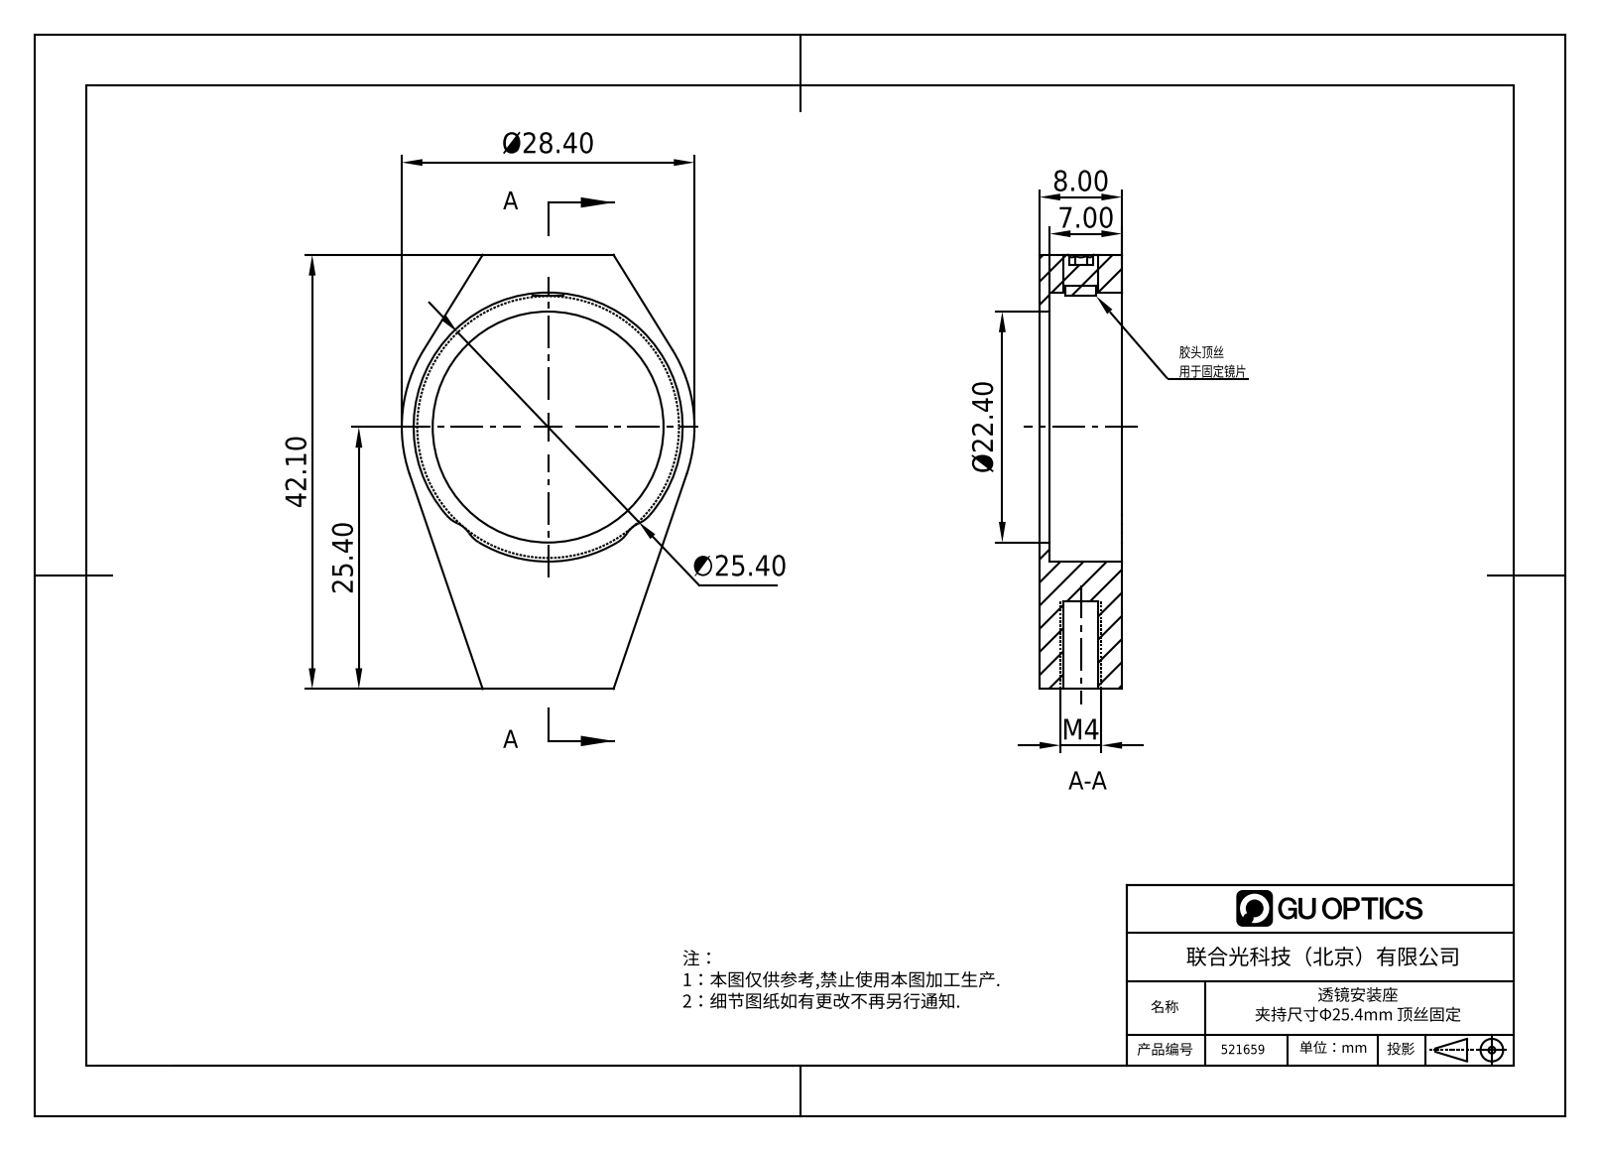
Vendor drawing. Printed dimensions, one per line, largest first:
42.10
Ø28.40
25.40
∅25.40
Ø22.40
8.00
7.00
M4
